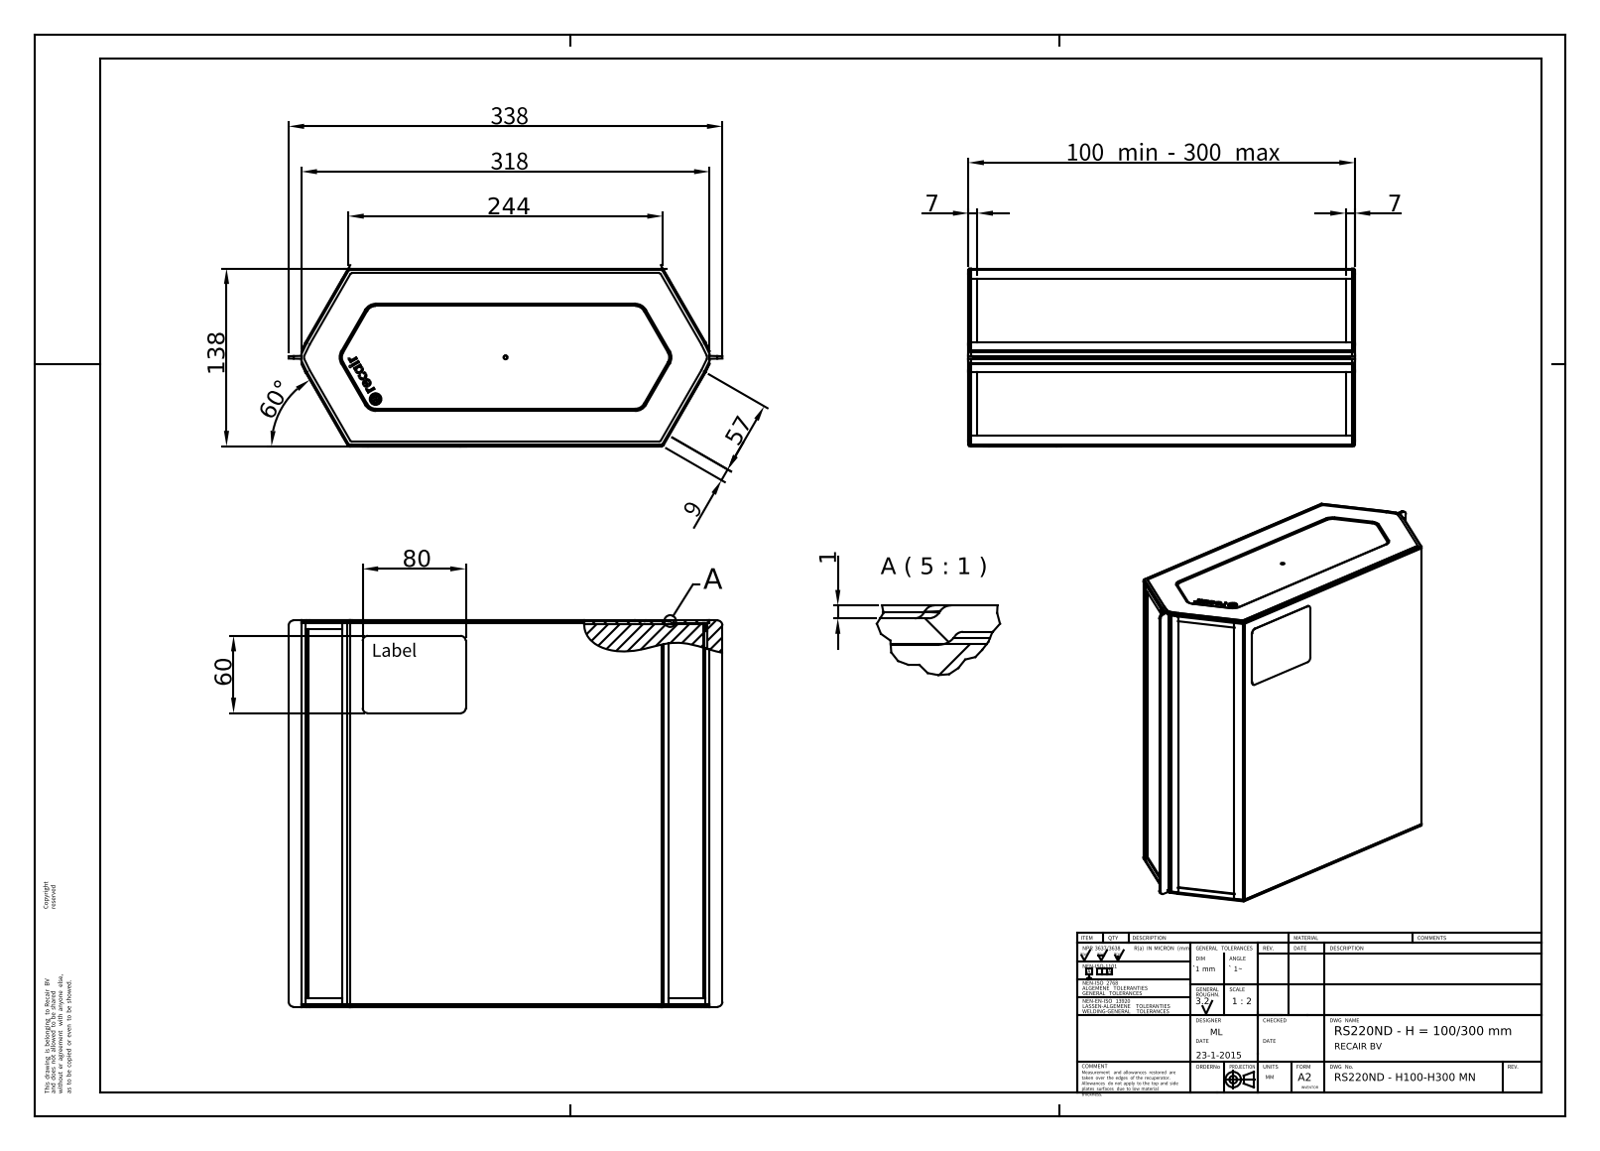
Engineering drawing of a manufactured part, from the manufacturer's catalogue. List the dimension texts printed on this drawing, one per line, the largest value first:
338
318
244
138
100 min - 300 max
80
60
60°
57
9
7
7
1
